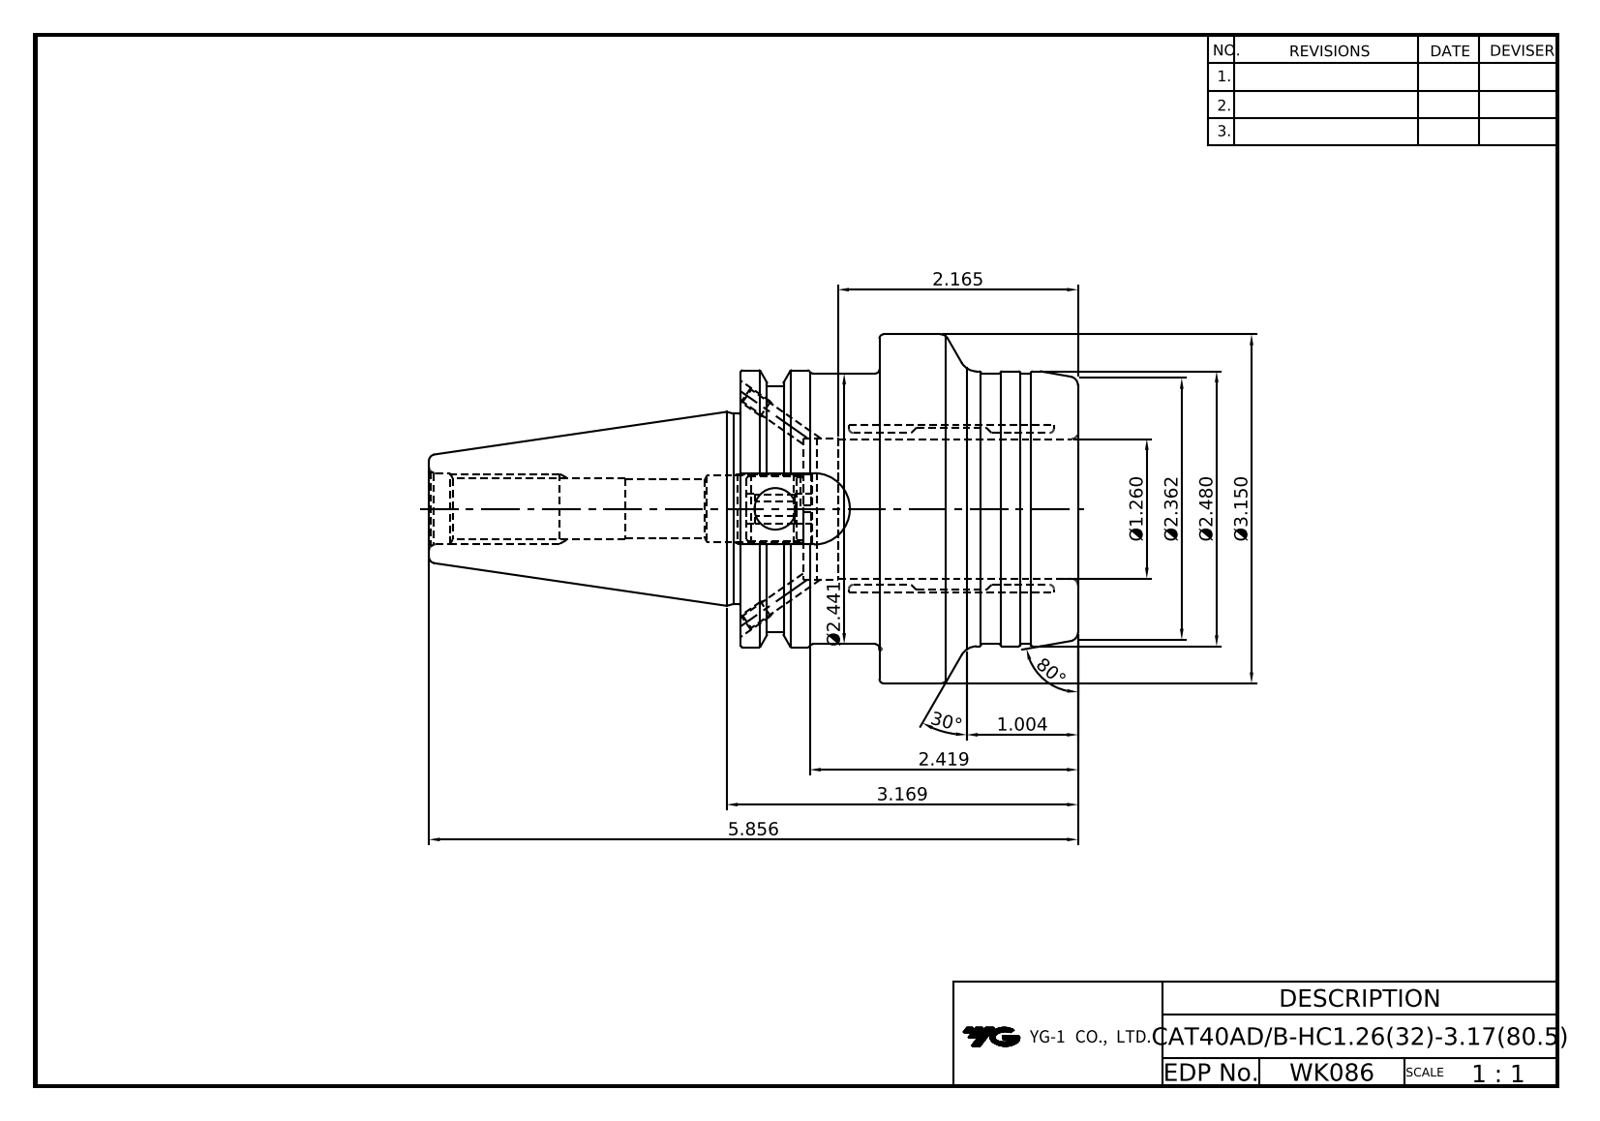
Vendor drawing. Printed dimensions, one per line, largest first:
80°
30°
5.856
3.169
Ø3.150
Ø2.480
Ø2.441
2.419
Ø2.362
2.165
Ø1.260
1.004
